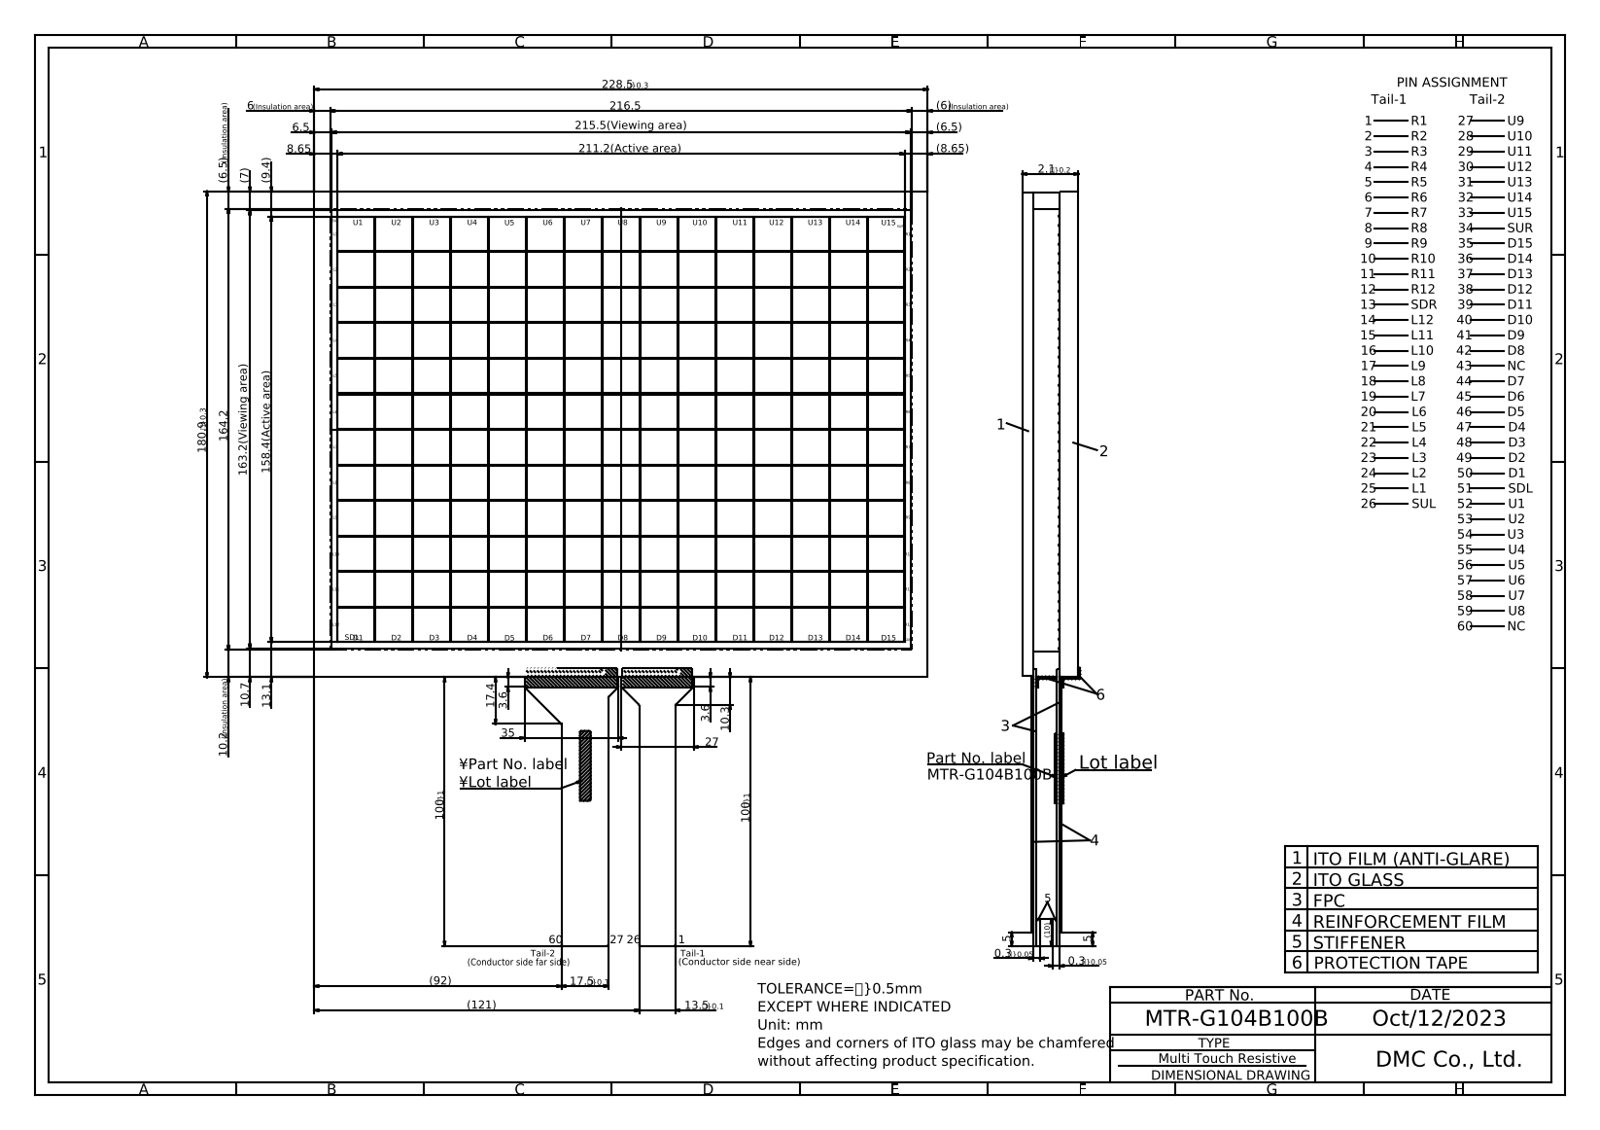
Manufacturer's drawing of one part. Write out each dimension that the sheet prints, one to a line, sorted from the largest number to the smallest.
228.50
216.5
215.5(Viewing area)
211.2(Active area)
180.90
164.2
163.2(Viewing area)
158.4(Active area)
(121)
100.00
100.00
(92)
35
27
17.50
17.4
13.50
13.1
10.7
10.3
10.20{\H0.6667x;(Insulation area)}
(10)
(9.4)
(8.65)
8.65
(7)
(6.5)
6.5
(6.500){\H0.66667x;(Insulation area)}
(6.000){\H0.6667x;(Insulation area)}
6.00{\H0.6667x;(Insulation area)}
5
5
3.6
3.6
2.1{\H0.6667x;?}0.2}
0.3{\H0.6667x;?}0.05}
0.3{\H0.6667x;?}0.05}
